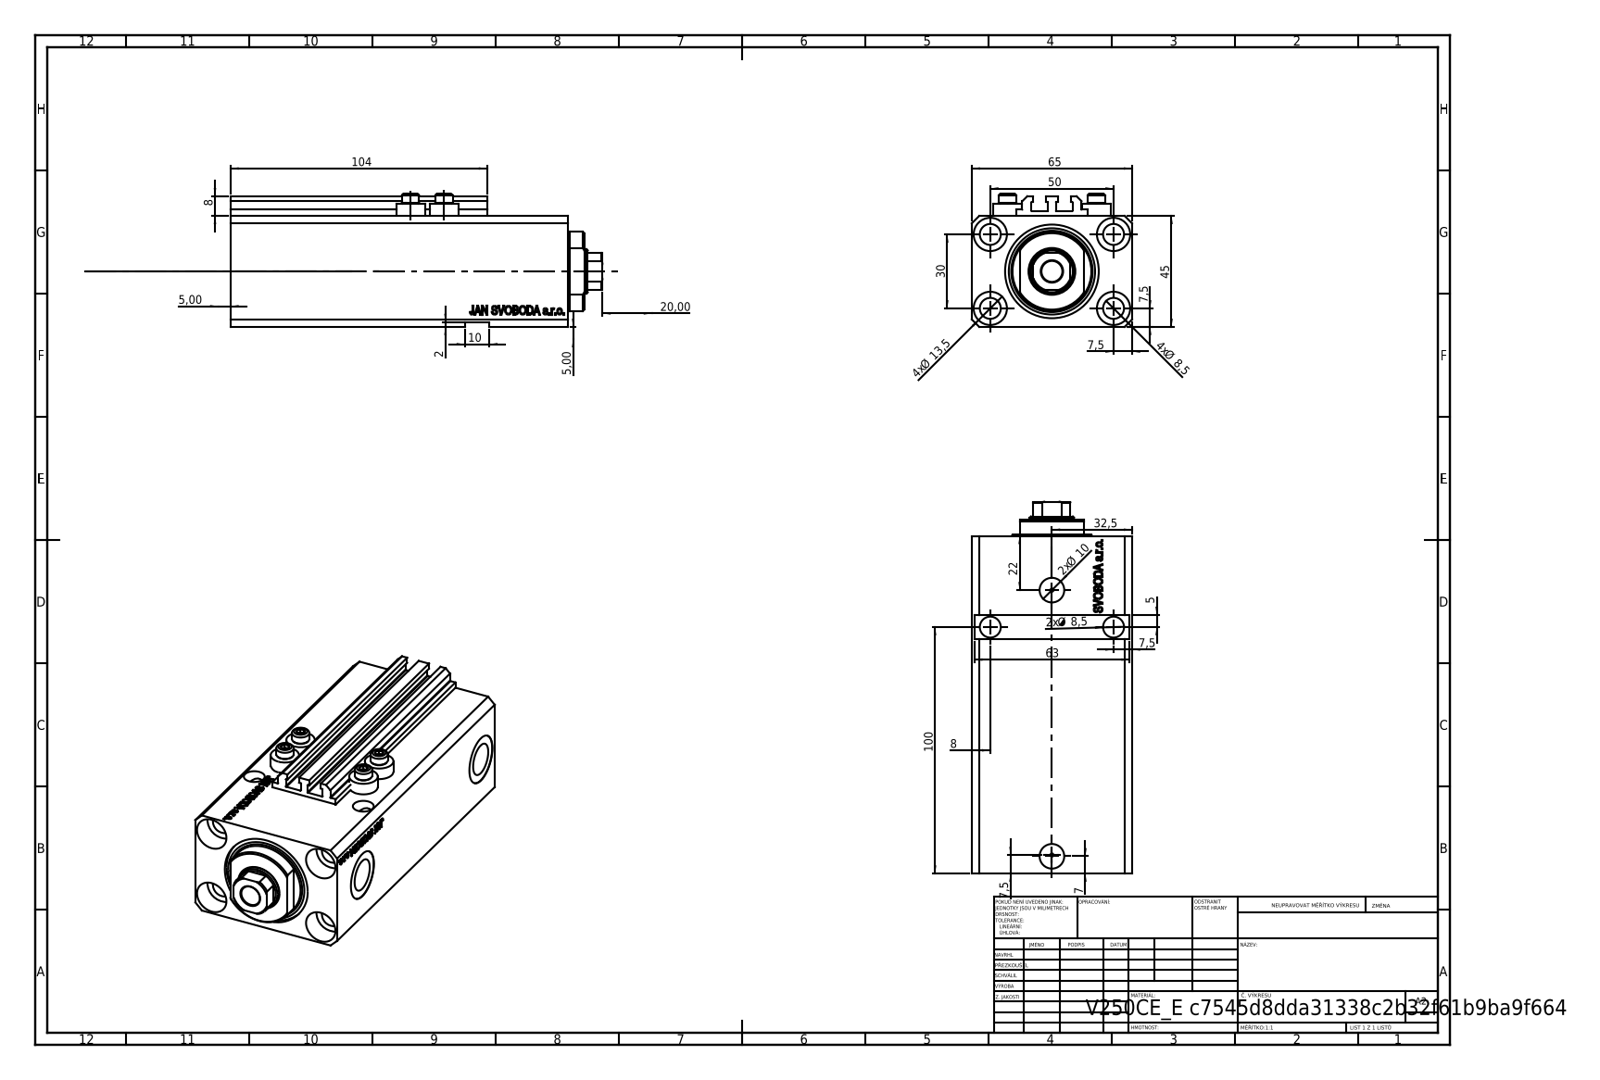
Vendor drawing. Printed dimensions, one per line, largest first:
104
100
65
63
50
45
32,5
30
22
20,00
4x Ø 13,5
10
2x Ø 10
4x Ø 8,5
2x Ø 8,5
8
8
7,5
7,5
7,5
7,5
7
5,00
5,00
5
2
